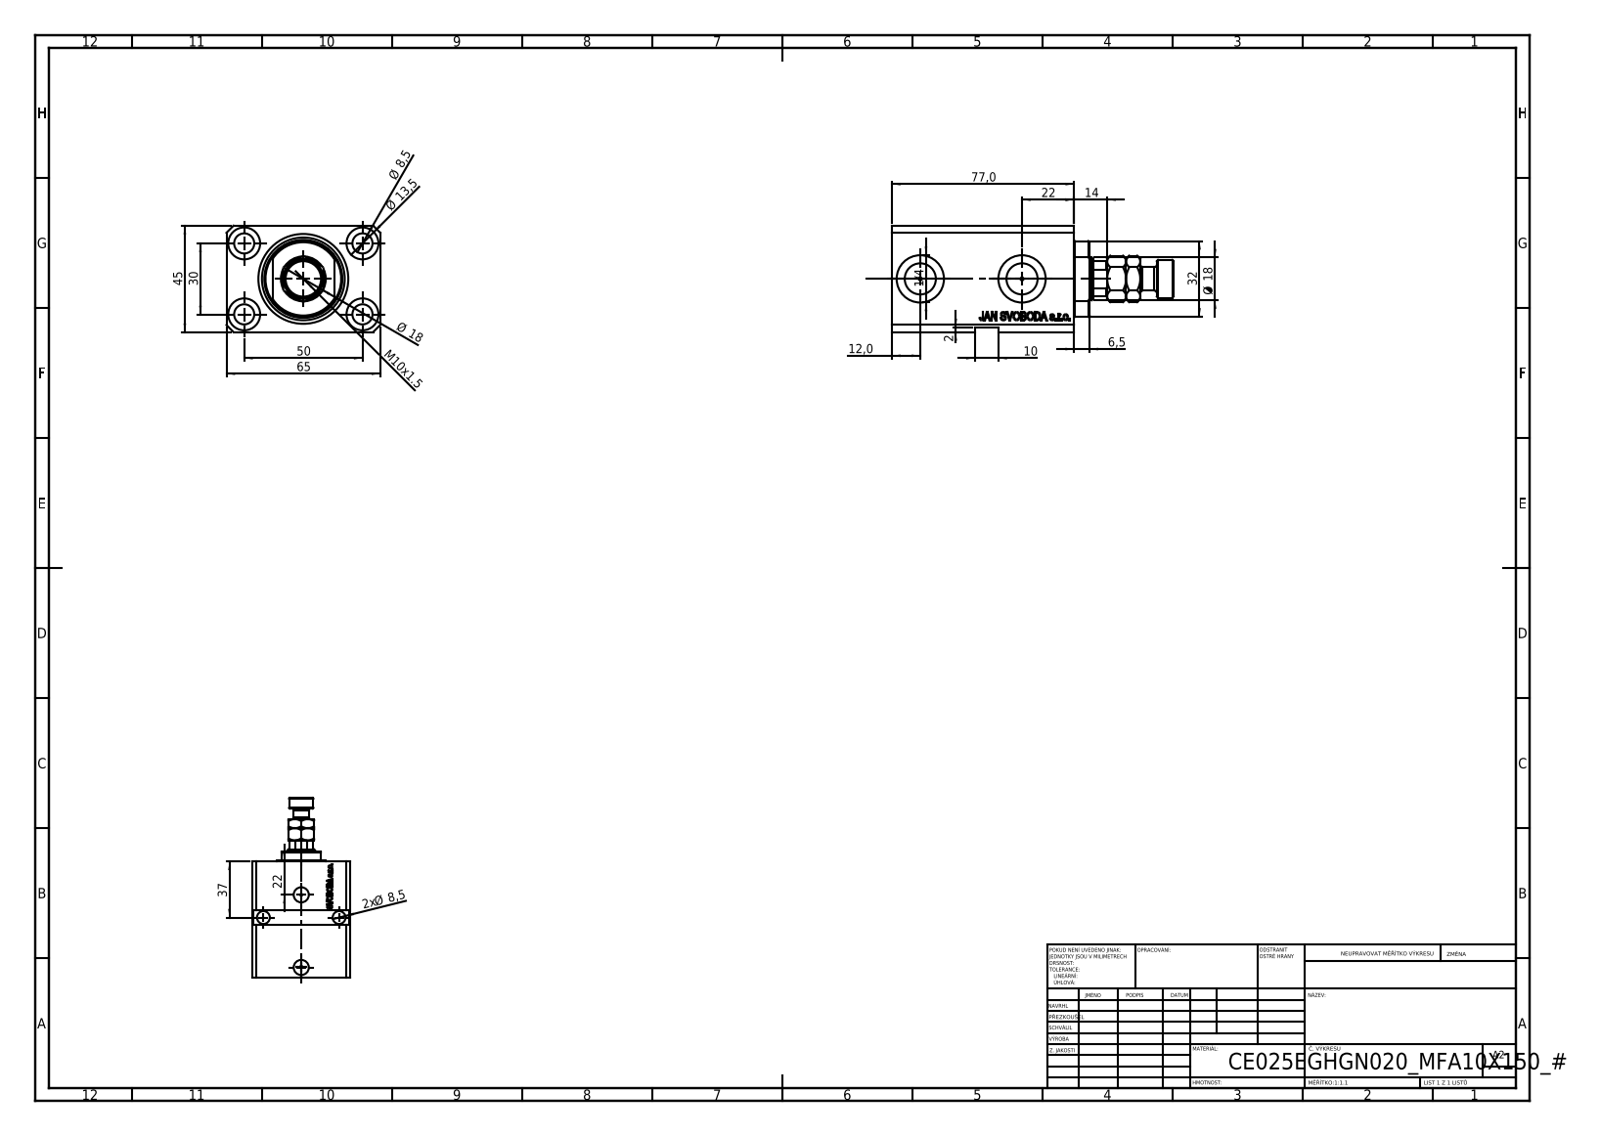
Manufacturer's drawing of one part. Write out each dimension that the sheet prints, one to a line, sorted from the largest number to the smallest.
77,0
65
50
45
37
32
30
22
22
Ø 18
Ø 18
14
Ø 13,5
12,0
M10x1.5
10
Ø 8,5
2x Ø 8,5
6,5
2
1/4
